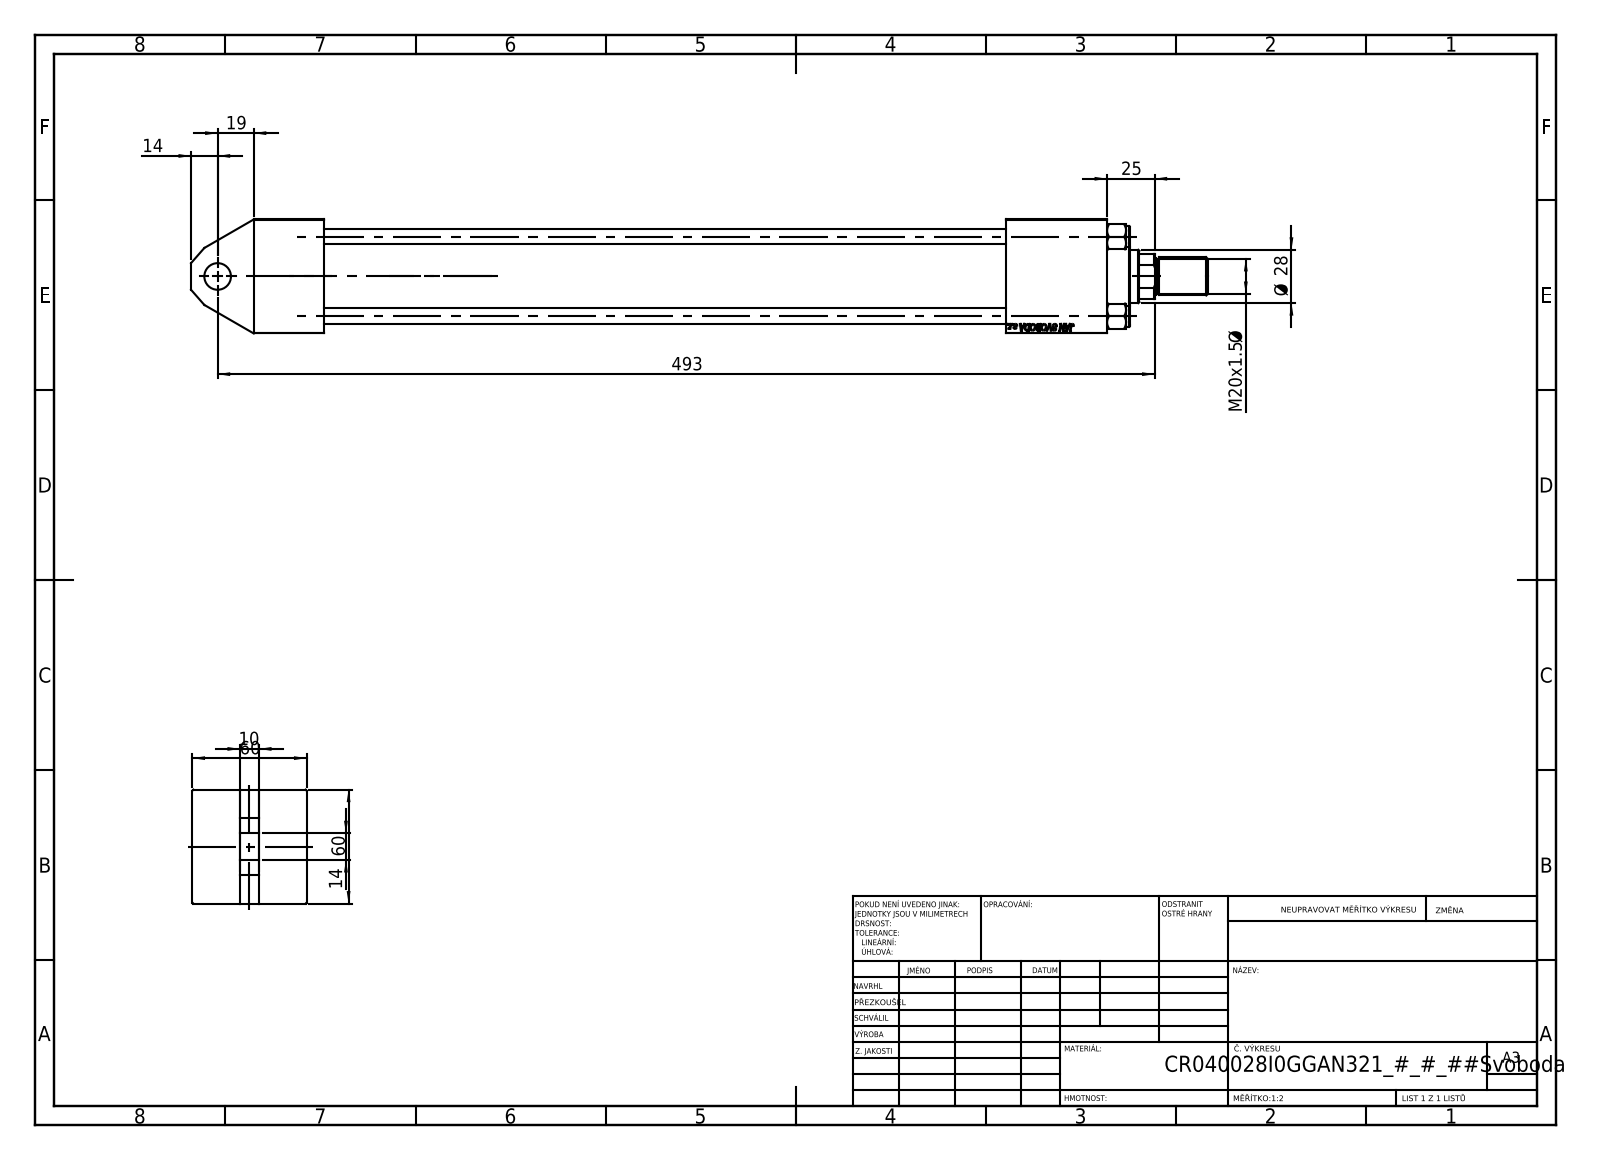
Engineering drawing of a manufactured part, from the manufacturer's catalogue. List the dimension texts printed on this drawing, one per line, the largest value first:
493
60
60
Ø 28
25
M20x1.5 Ø
19
14
14
10
